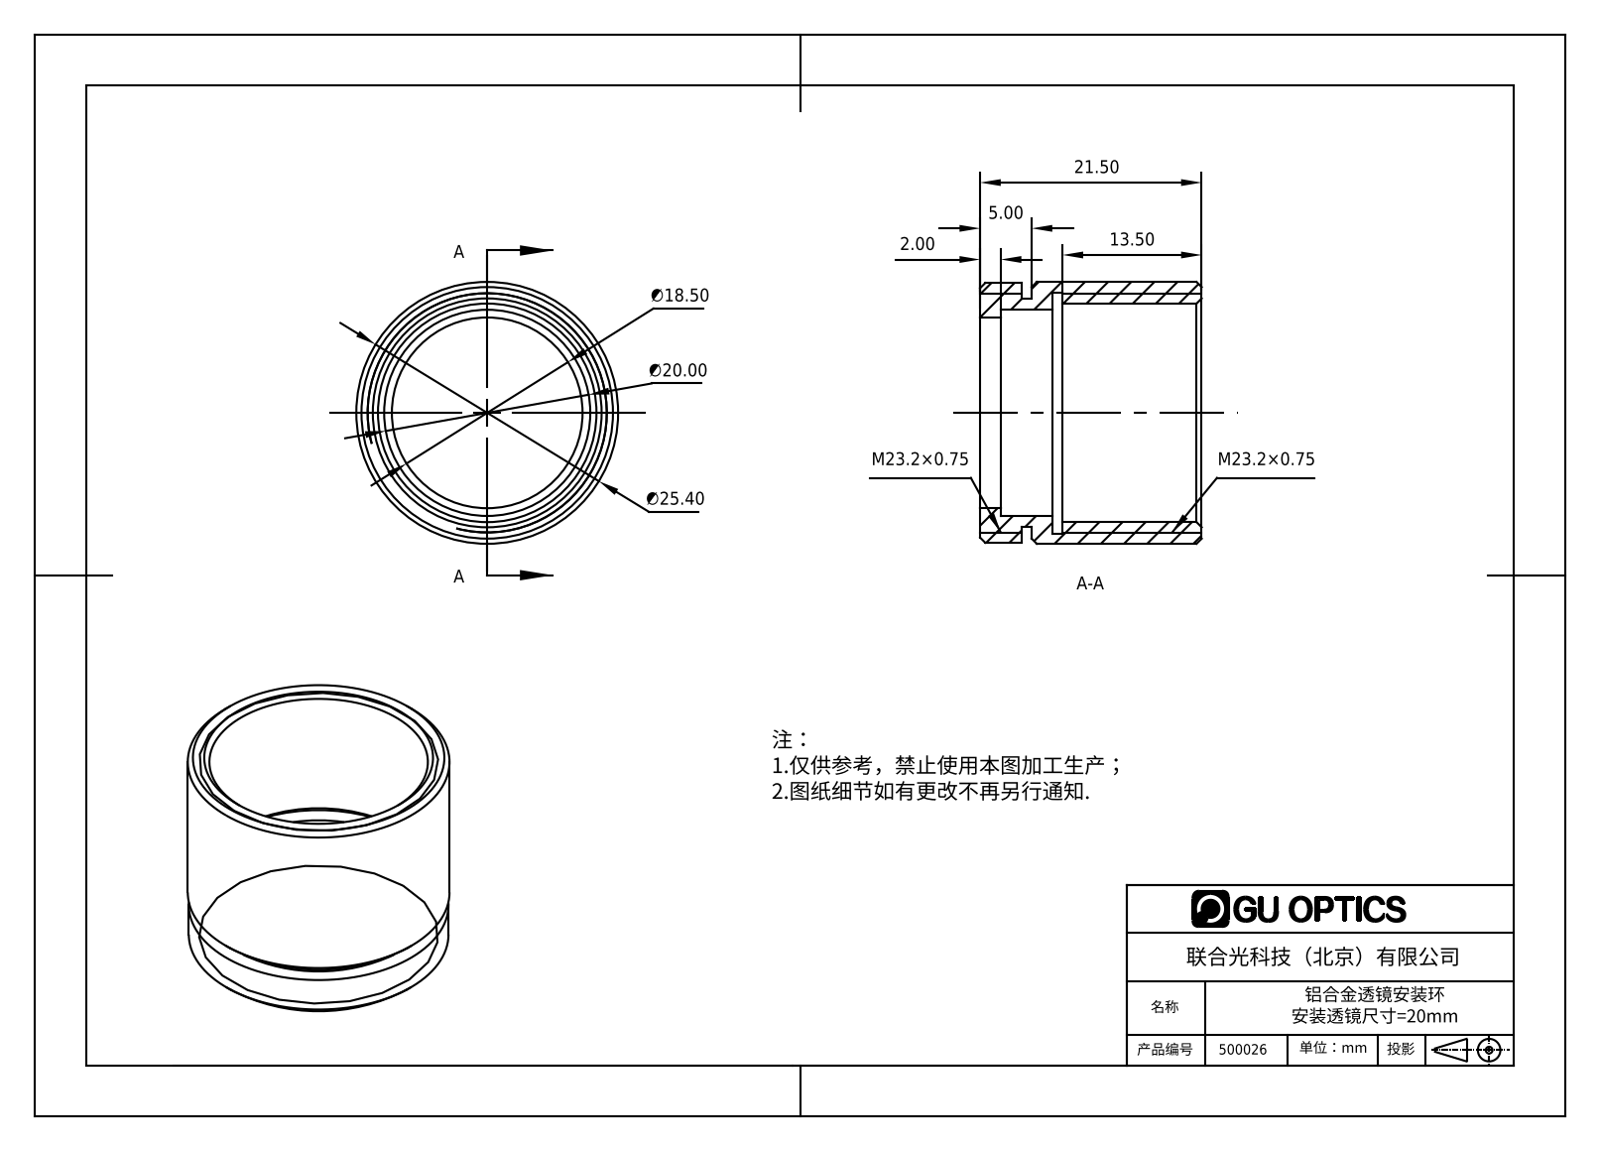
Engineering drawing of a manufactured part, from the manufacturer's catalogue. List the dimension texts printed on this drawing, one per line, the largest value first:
∅25.40
21.50
∅20.00
∅18.50
13.50
5.00
2.00
